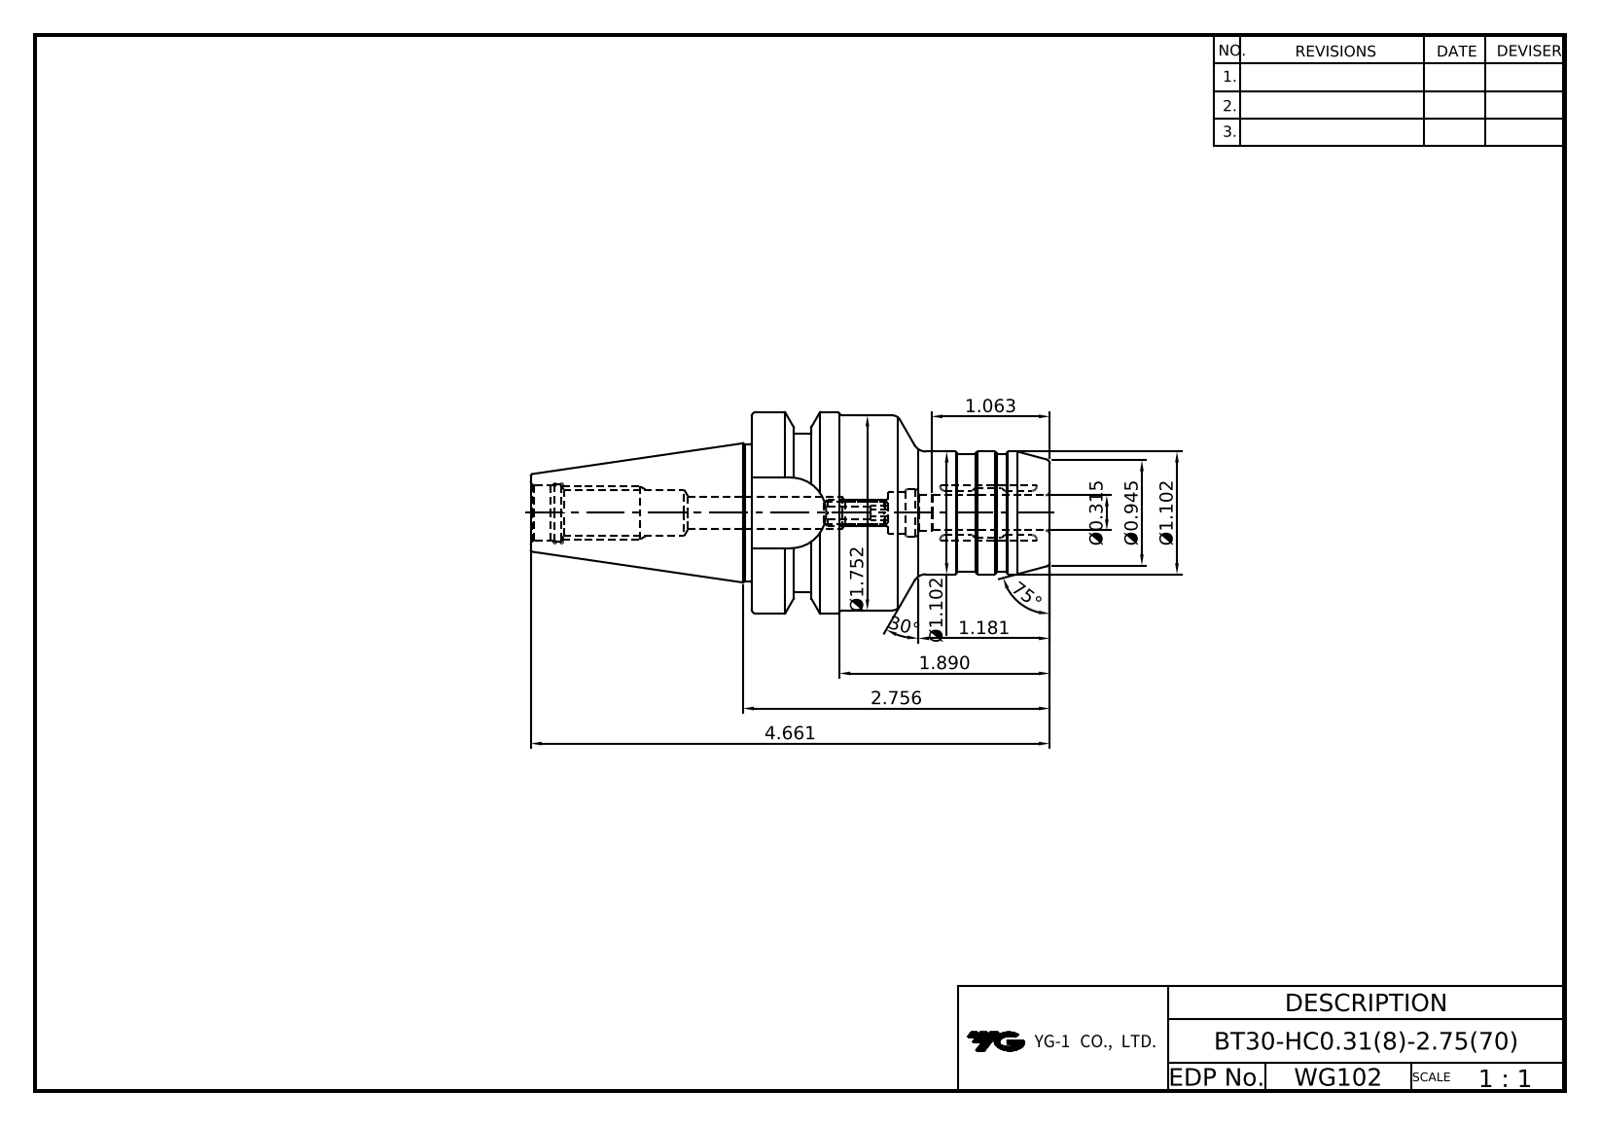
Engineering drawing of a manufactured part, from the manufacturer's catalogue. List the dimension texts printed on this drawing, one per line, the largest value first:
75°
30°
4.661
2.756
1.890
Ø1.752
1.181
Ø1.102
Ø1.102
1.063
Ø0.945
Ø0.315
